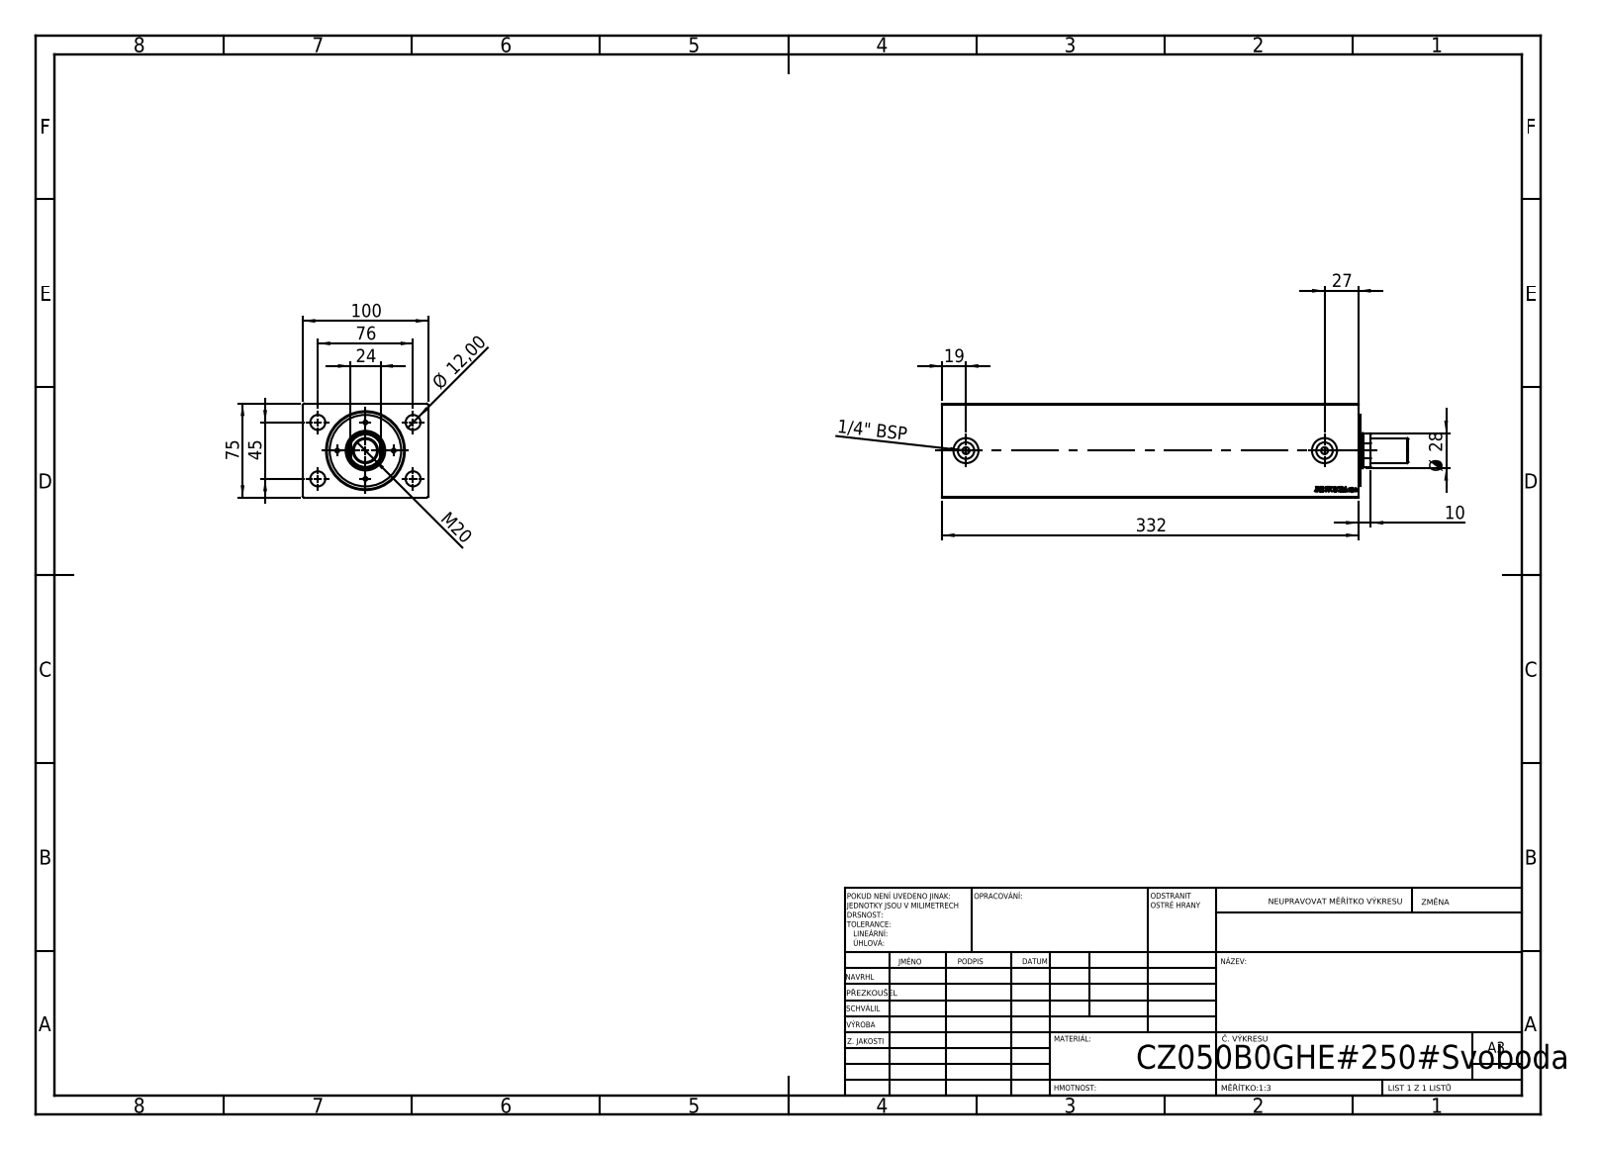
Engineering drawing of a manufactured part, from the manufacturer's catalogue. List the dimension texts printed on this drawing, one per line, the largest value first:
332
100
76
75
45
Ø 28
27
24
M20
19
Ø 12,00
10
1/4" BSP
